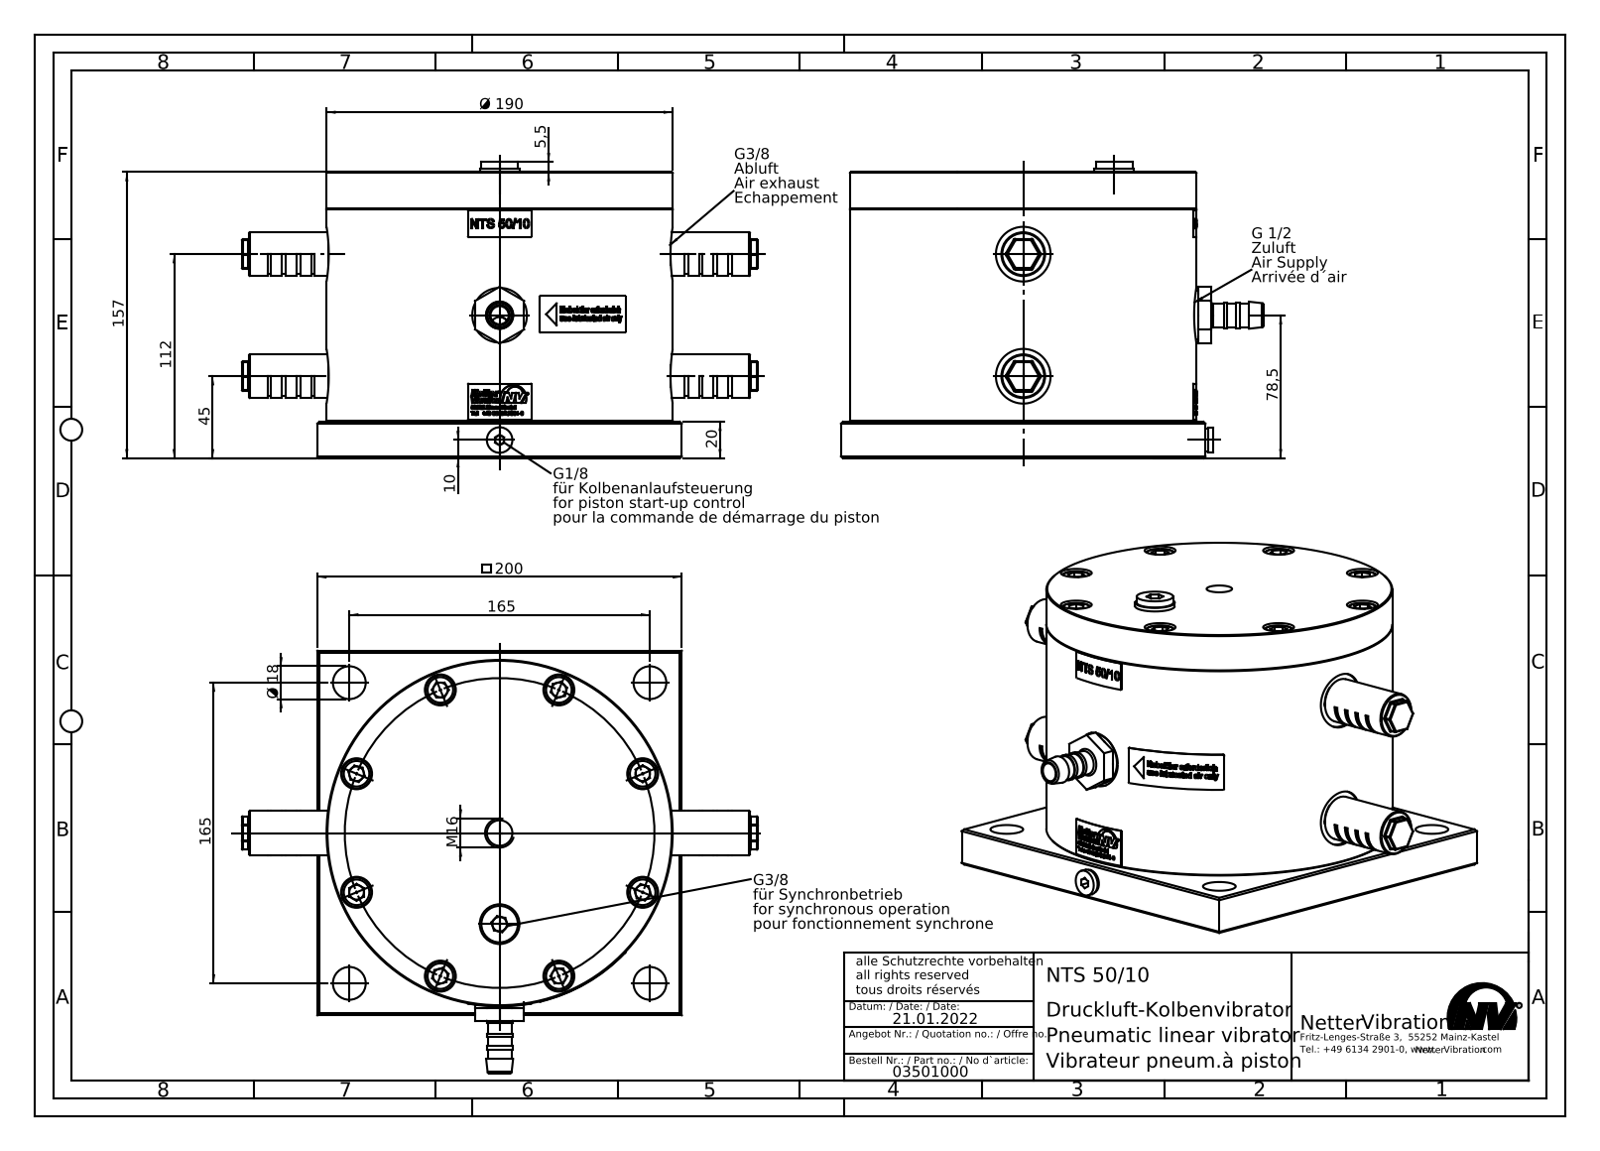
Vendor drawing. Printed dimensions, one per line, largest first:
200
Ø 190
165
165
157
112
78,5
45
20
Ø 18
M 16
10
5,5
